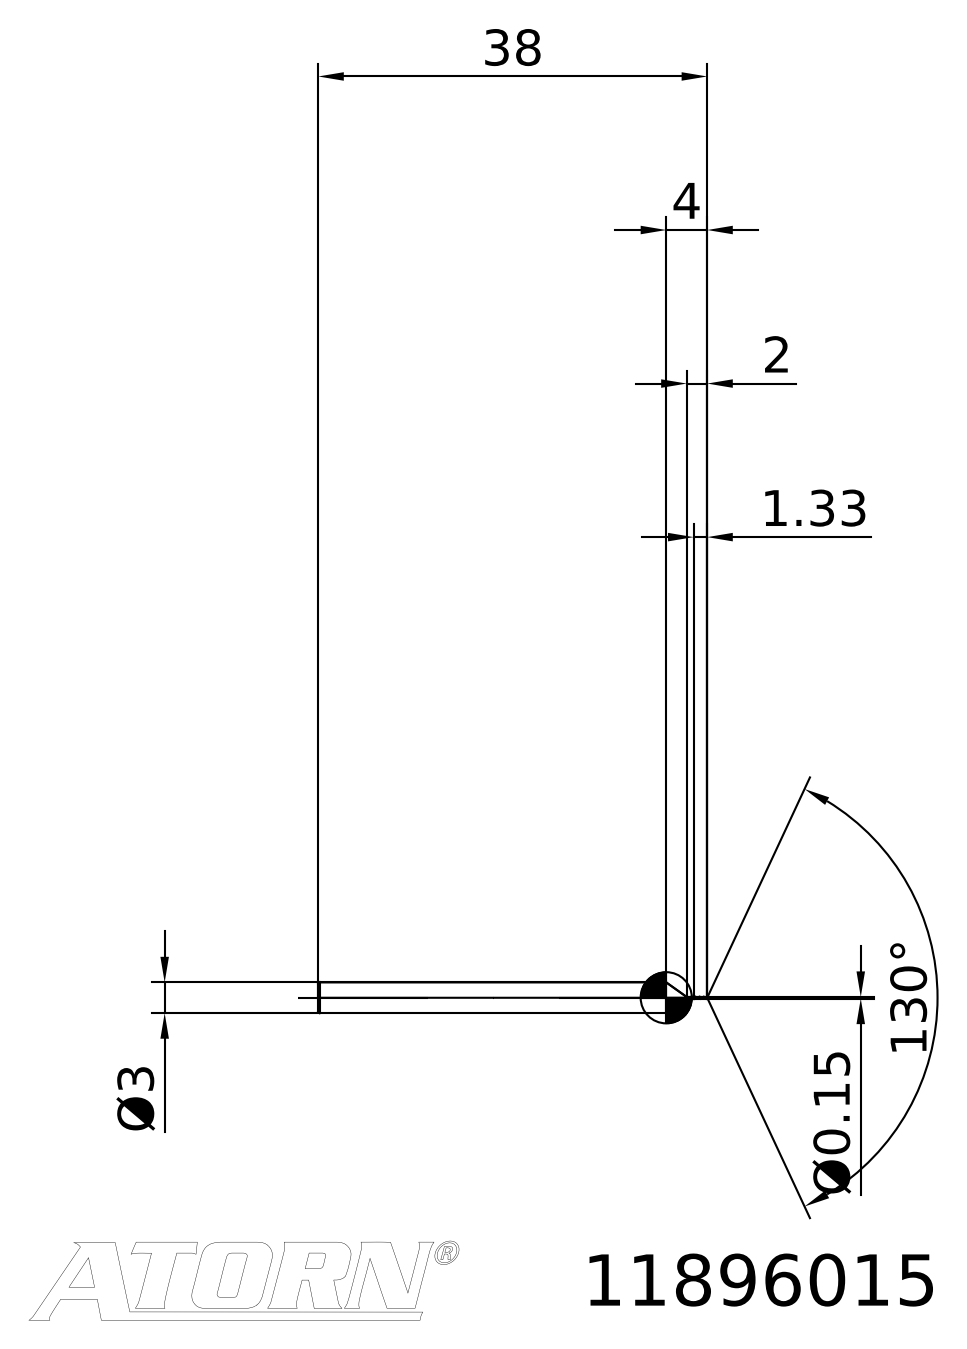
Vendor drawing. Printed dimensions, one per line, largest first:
130°
38
4
Ø3
2
1.33
Ø0.15
